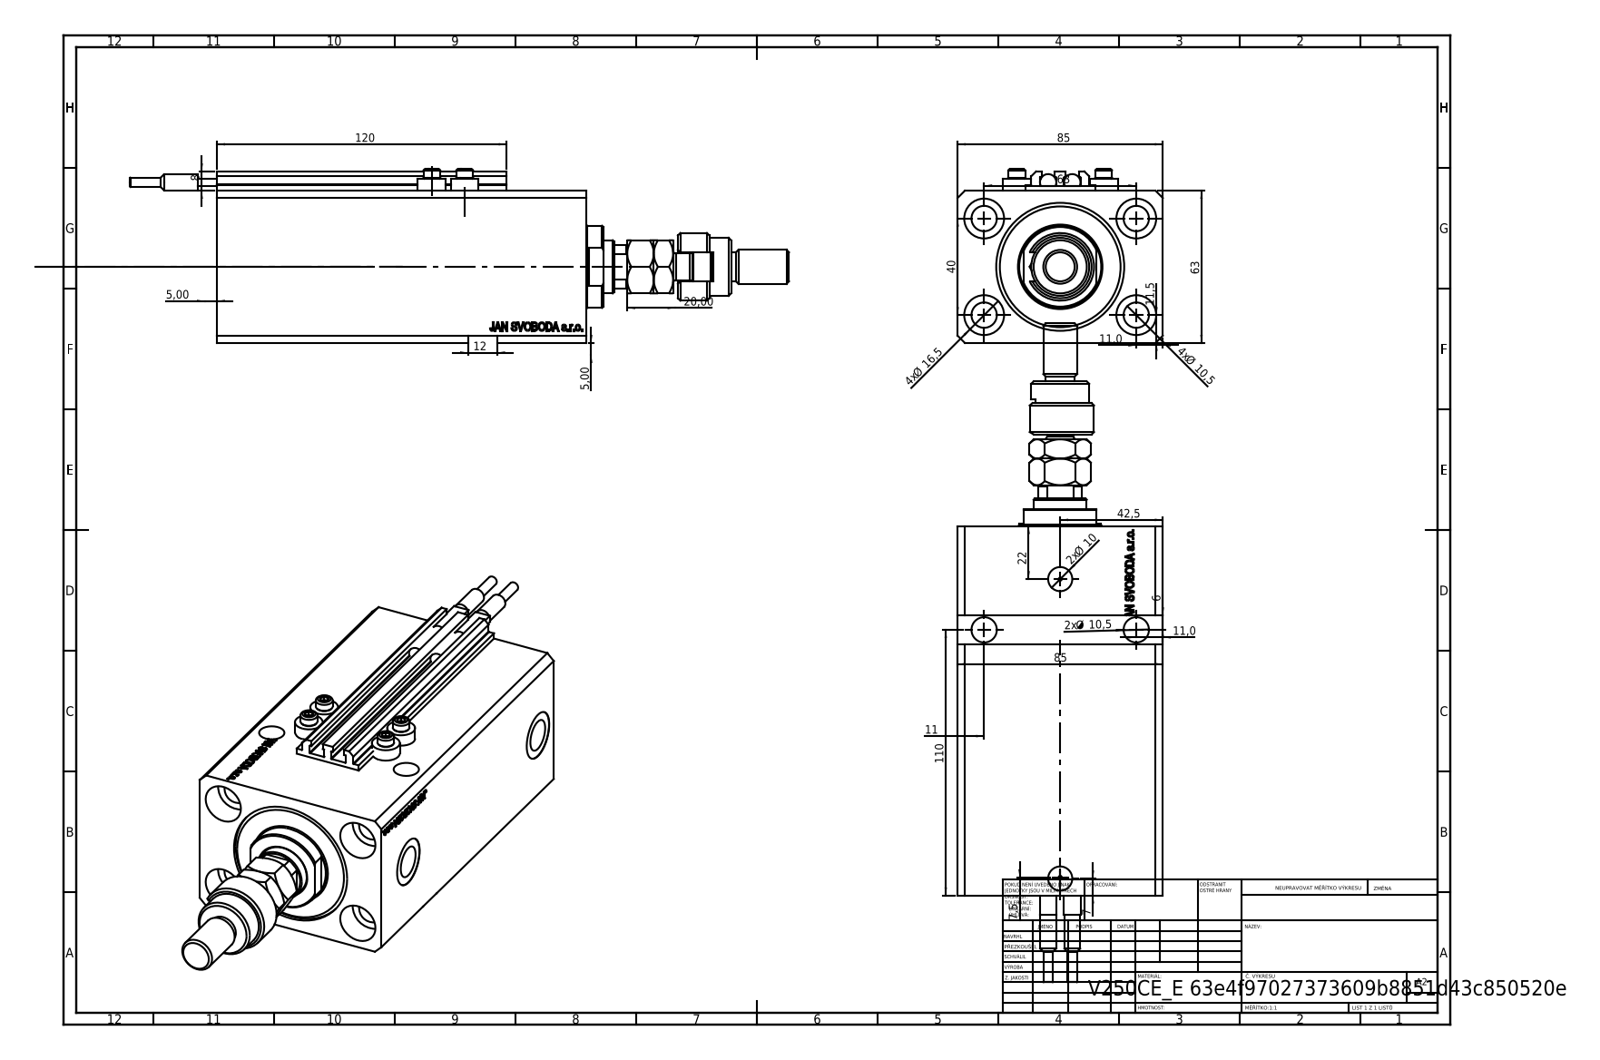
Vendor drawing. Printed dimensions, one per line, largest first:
120
110
85
85
63
63
42,5
40
22
20,00
4x Ø 16,5
12
11,5
11,0
11,0
11
4x Ø 10,5
2x Ø 10,5
2x Ø 10
8
7,5
7
6
5,00
5,00
